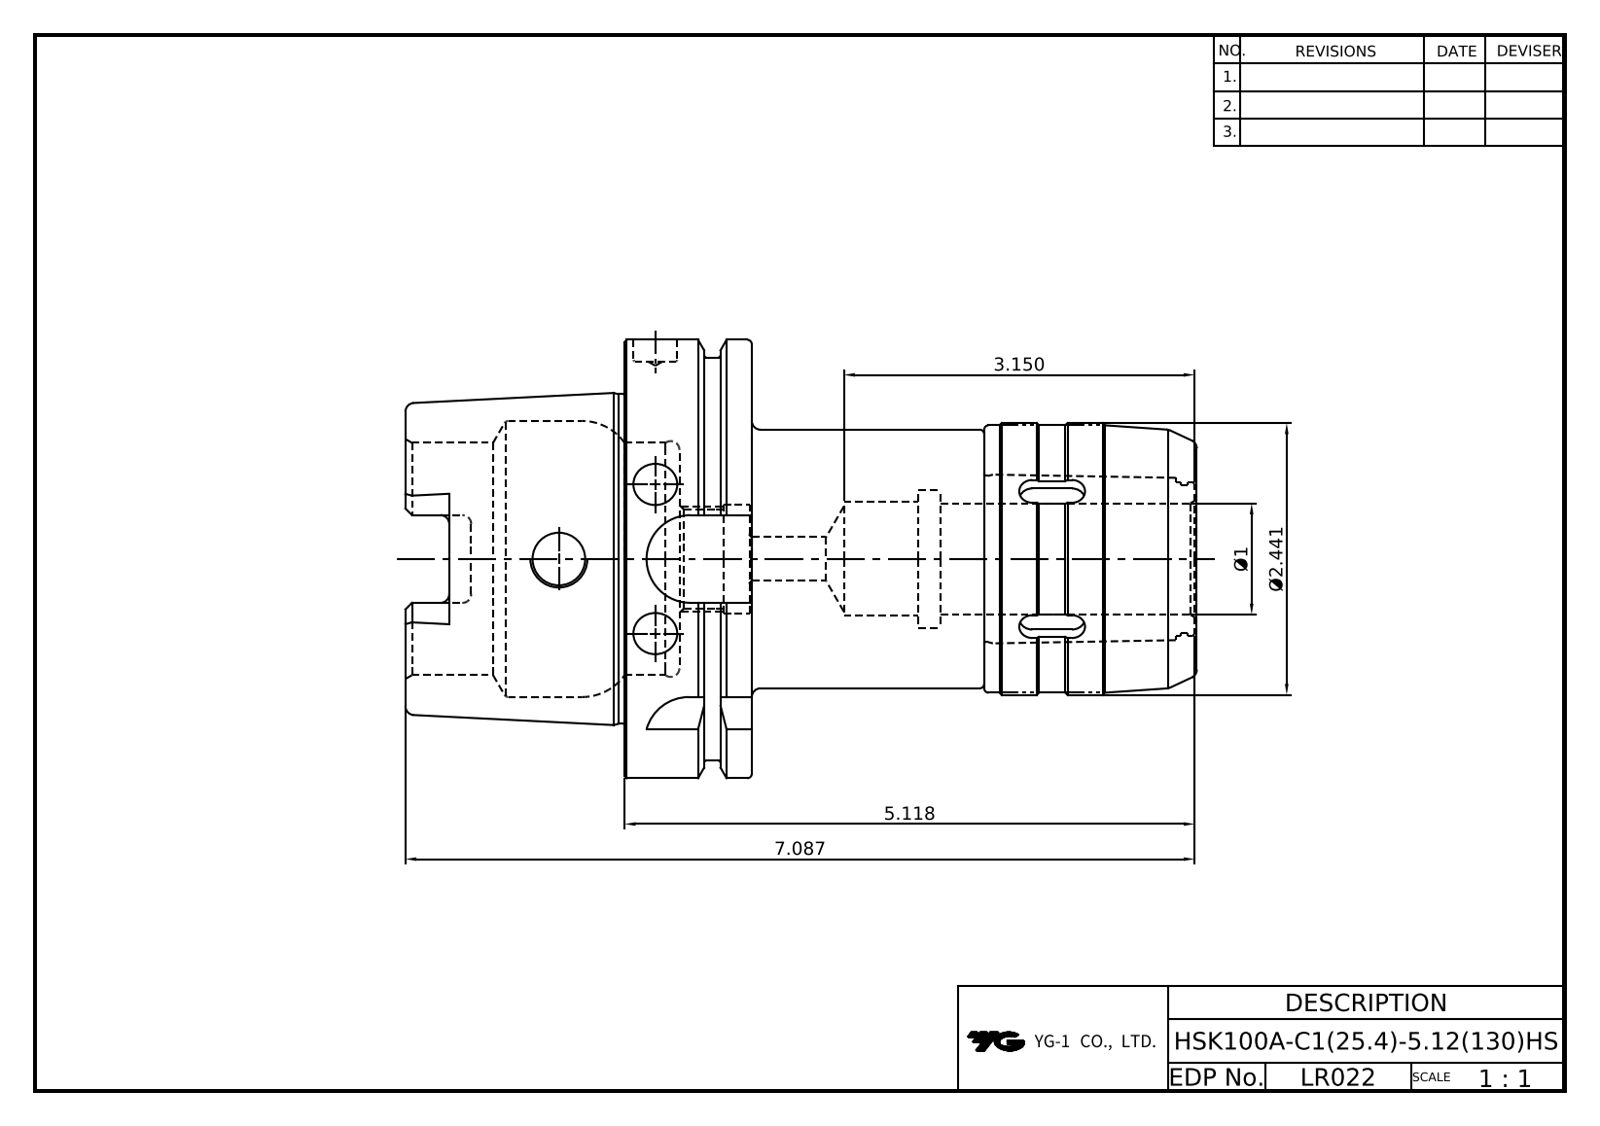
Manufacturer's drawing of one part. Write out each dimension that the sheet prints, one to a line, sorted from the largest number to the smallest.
7.087
5.118
3.150
Ø2.441
Ø1
